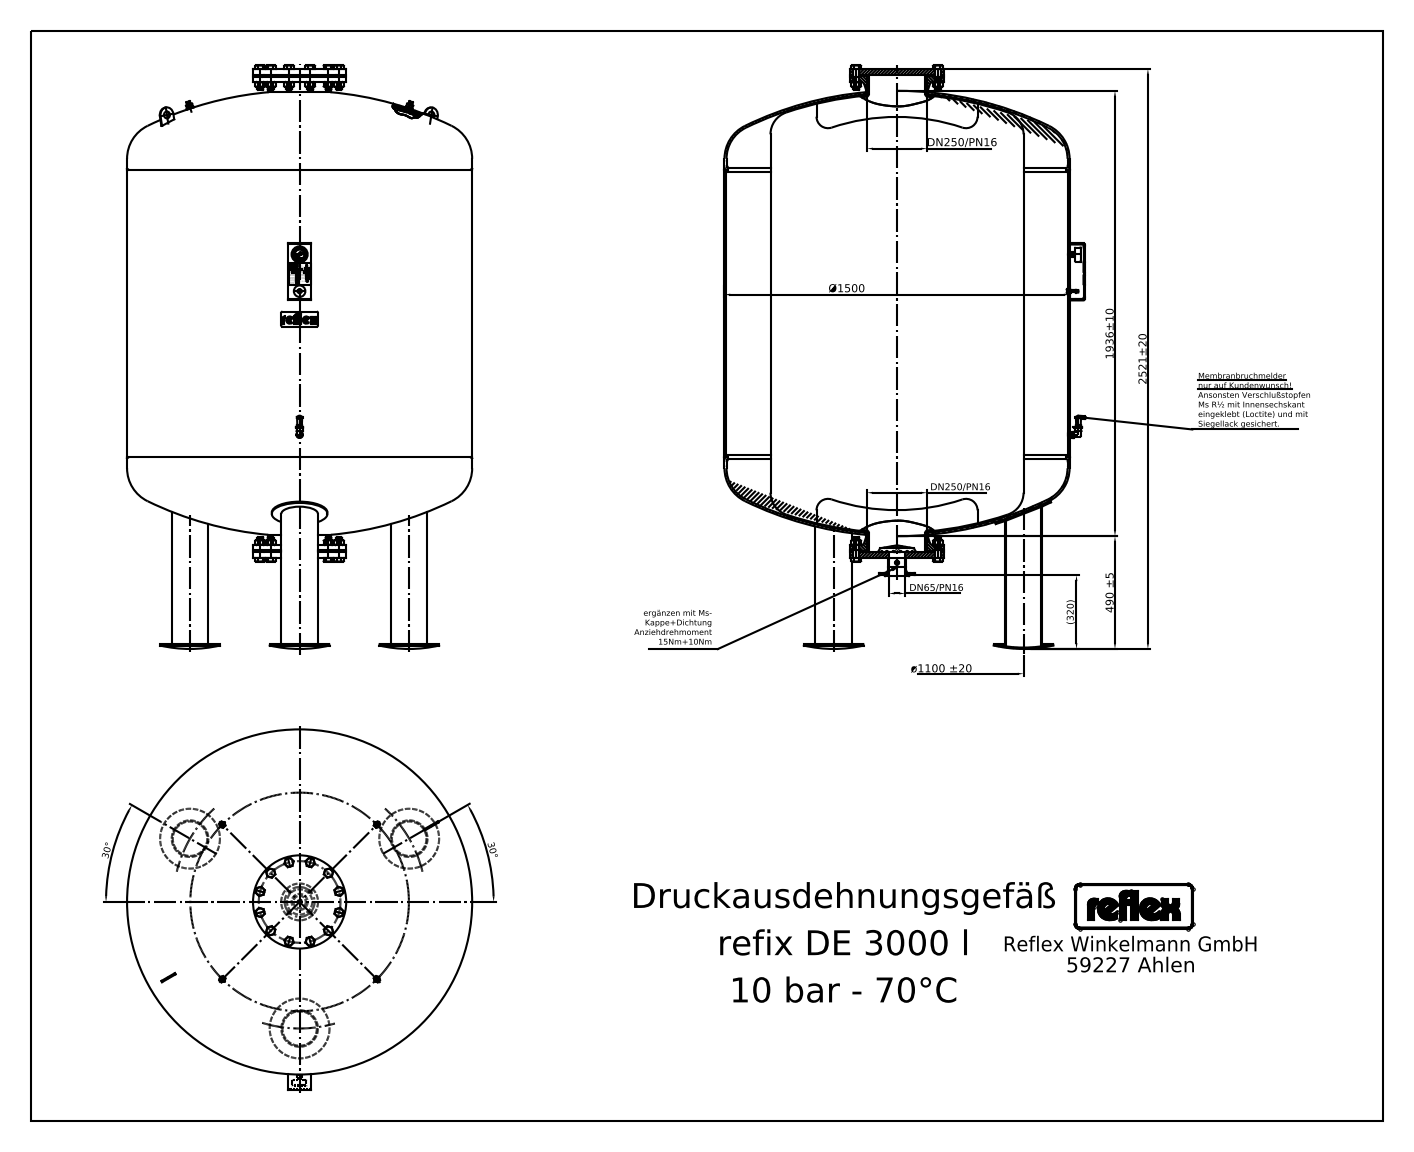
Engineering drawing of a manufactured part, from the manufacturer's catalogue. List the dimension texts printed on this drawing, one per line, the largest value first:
2521±20
1936±10
Ø1500
ø1100 ±20
490 ±5
(320)
DN250/PN16
DN250/PN16
DN65/PN16
30°
30°
